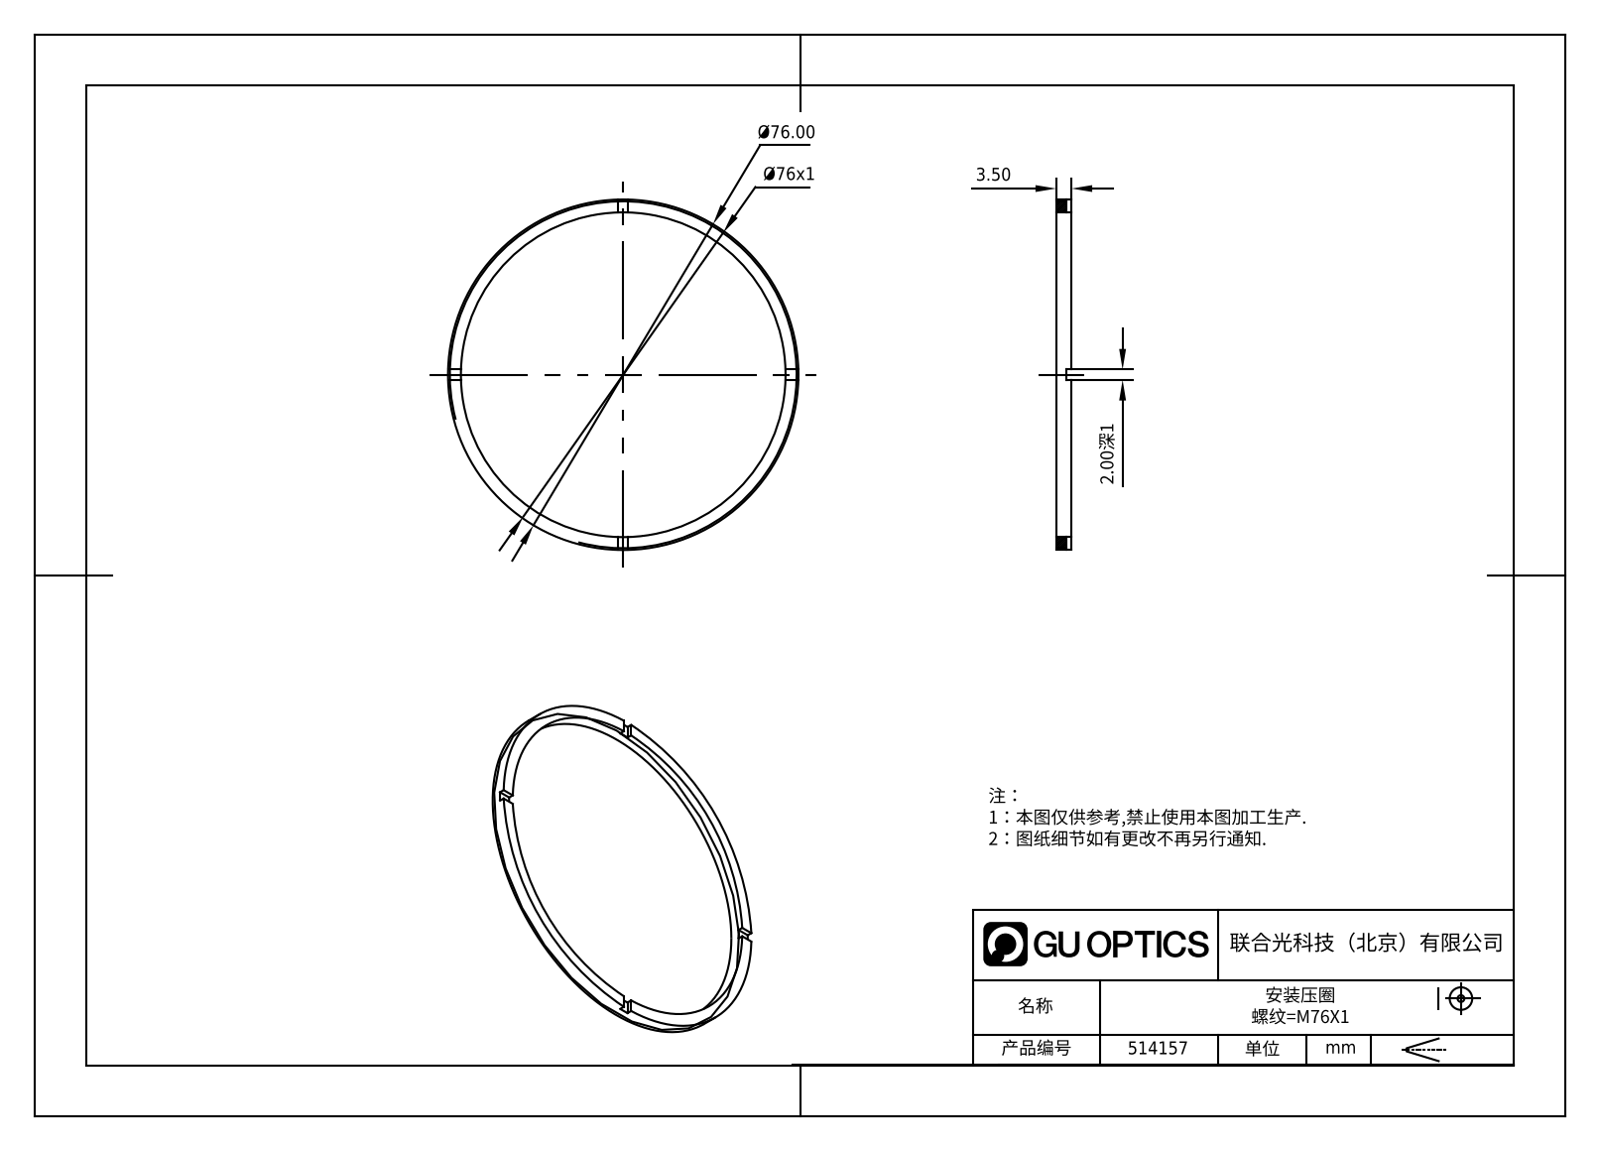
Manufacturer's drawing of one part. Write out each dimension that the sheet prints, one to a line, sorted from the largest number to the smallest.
Ø76.00
Ø76x1
3.50
2.00深1
